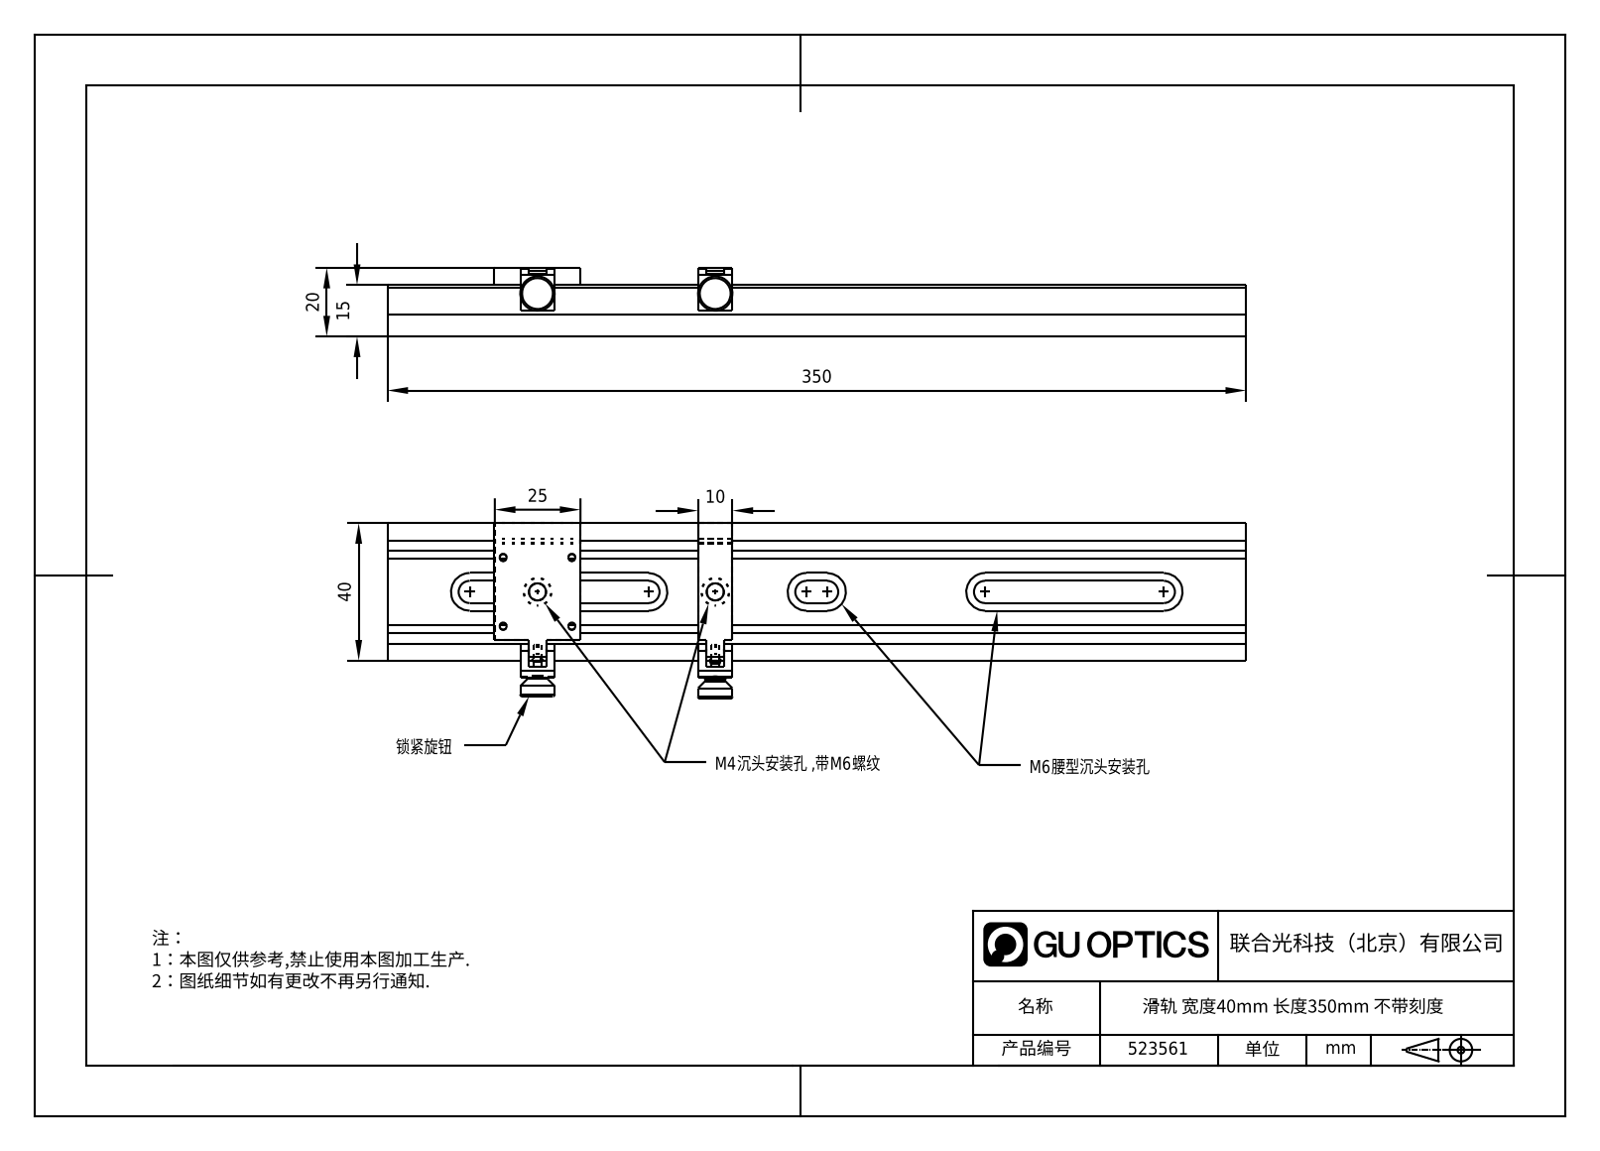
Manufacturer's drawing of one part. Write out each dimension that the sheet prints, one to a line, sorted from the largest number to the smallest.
350
40
25
20
15
10
